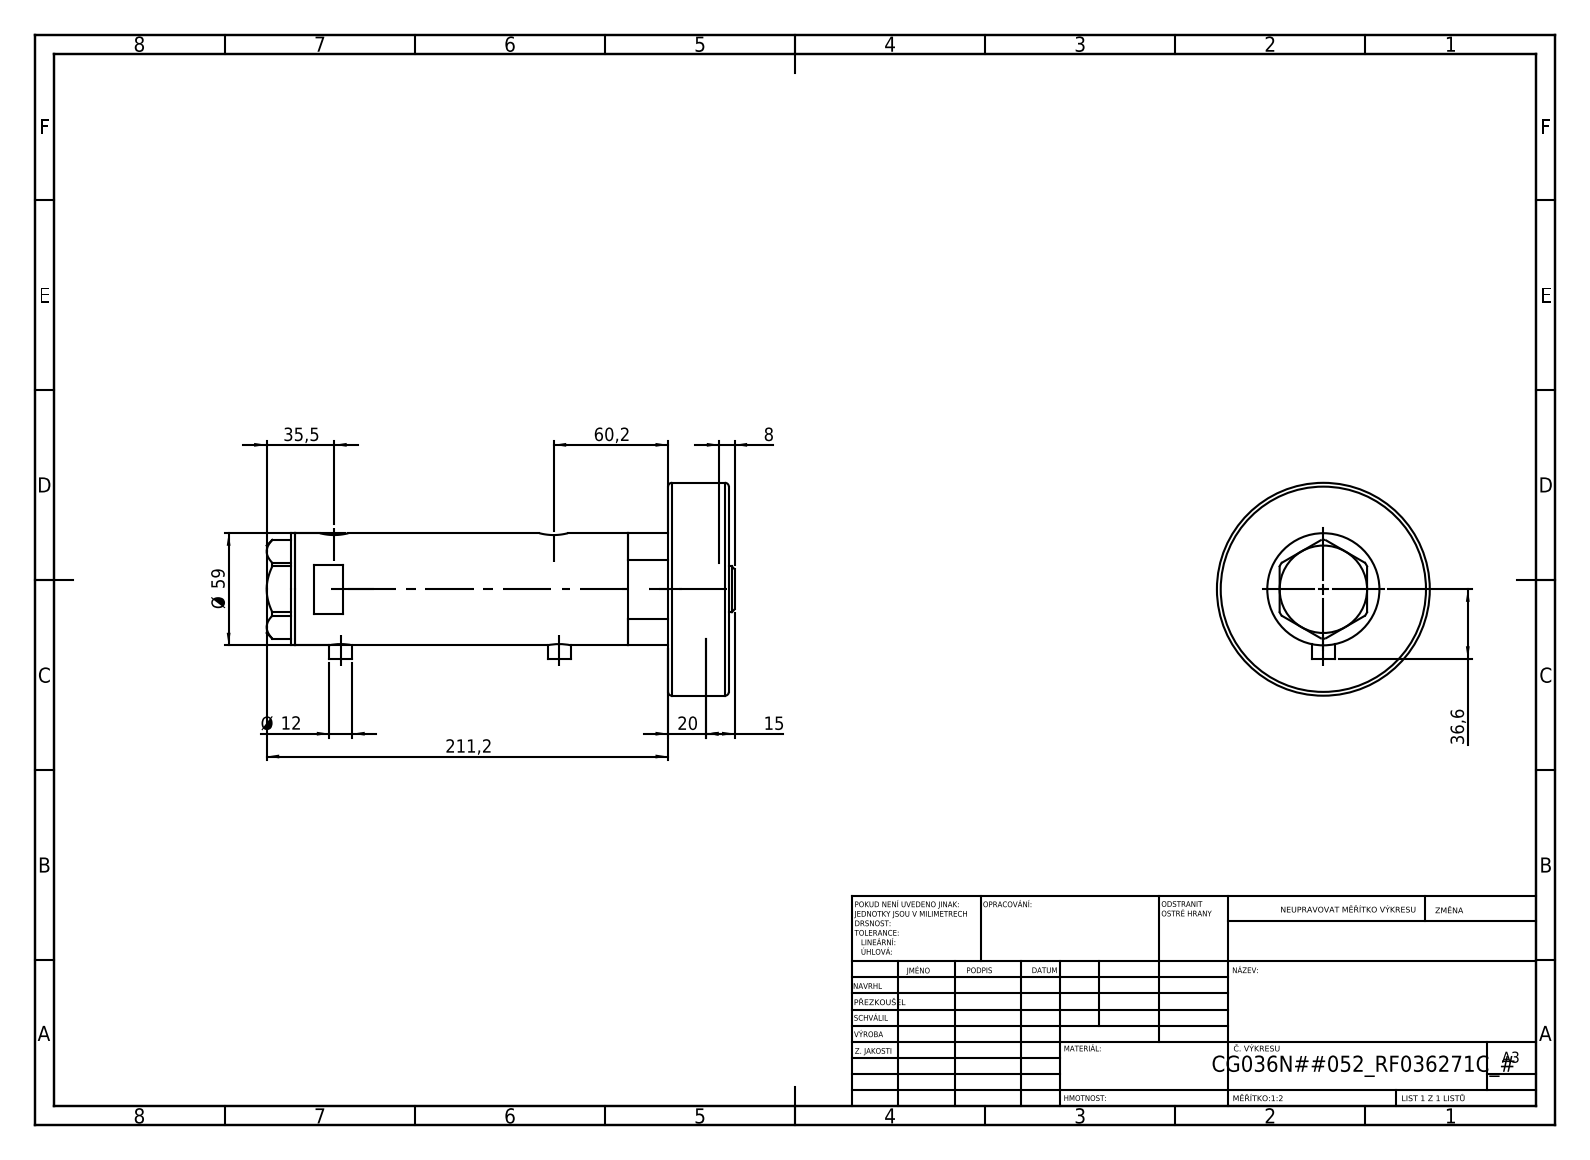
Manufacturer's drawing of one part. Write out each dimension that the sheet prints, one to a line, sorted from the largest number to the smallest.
211,2
60,2
Ø 59
36,6
35,5
20
15
Ø 12
8
